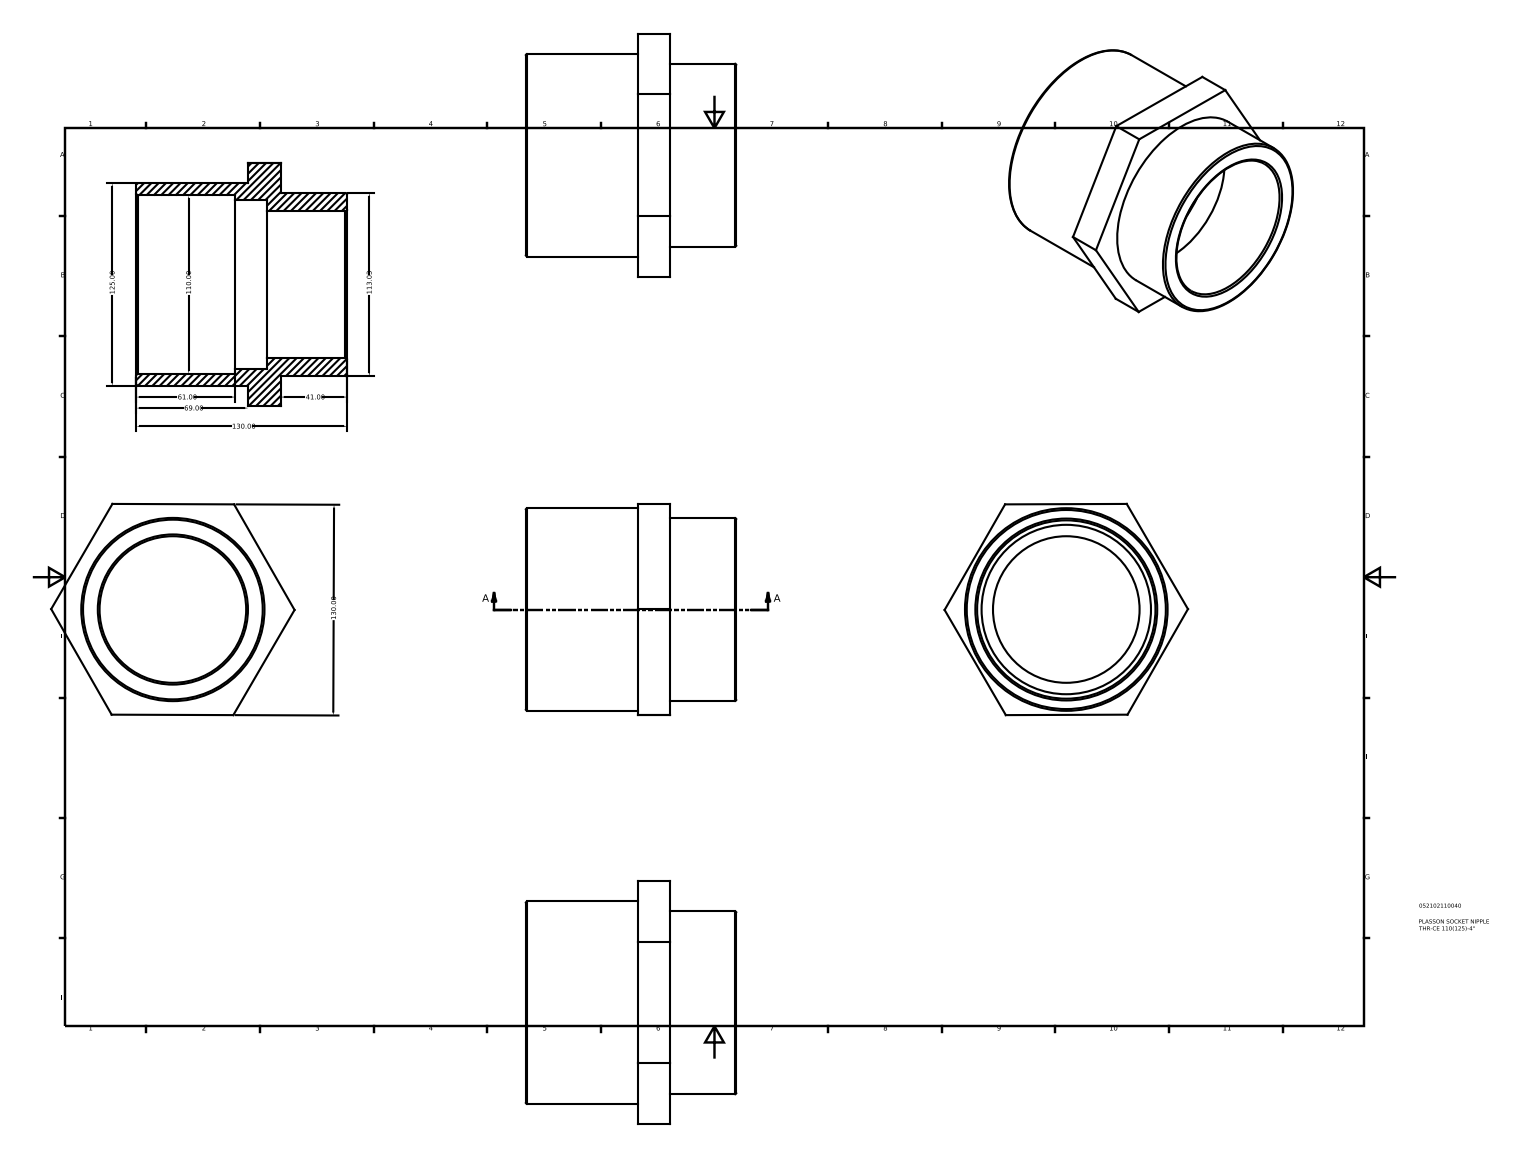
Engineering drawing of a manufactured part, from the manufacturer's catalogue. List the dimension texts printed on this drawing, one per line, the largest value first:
130.00
130.00
125.00
113.03
110.00
69.00
61.00
41.00
